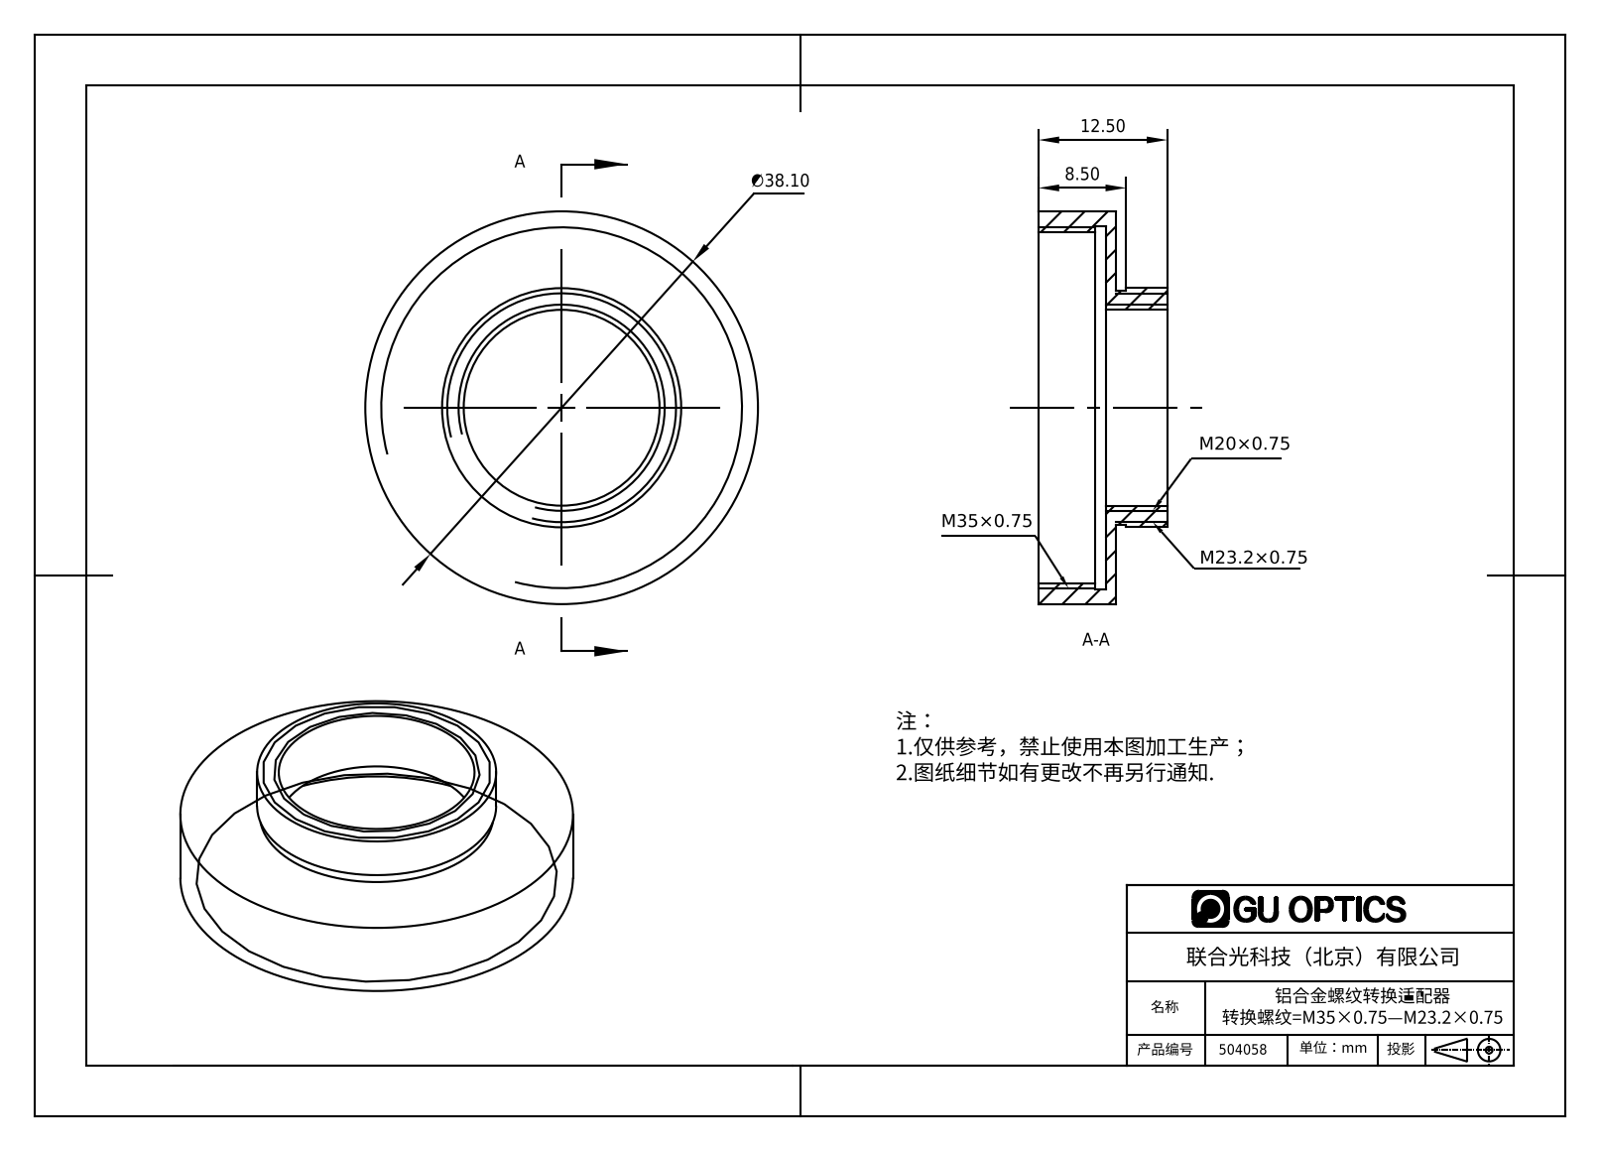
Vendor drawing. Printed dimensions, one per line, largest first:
∅38.10
12.50
8.50
